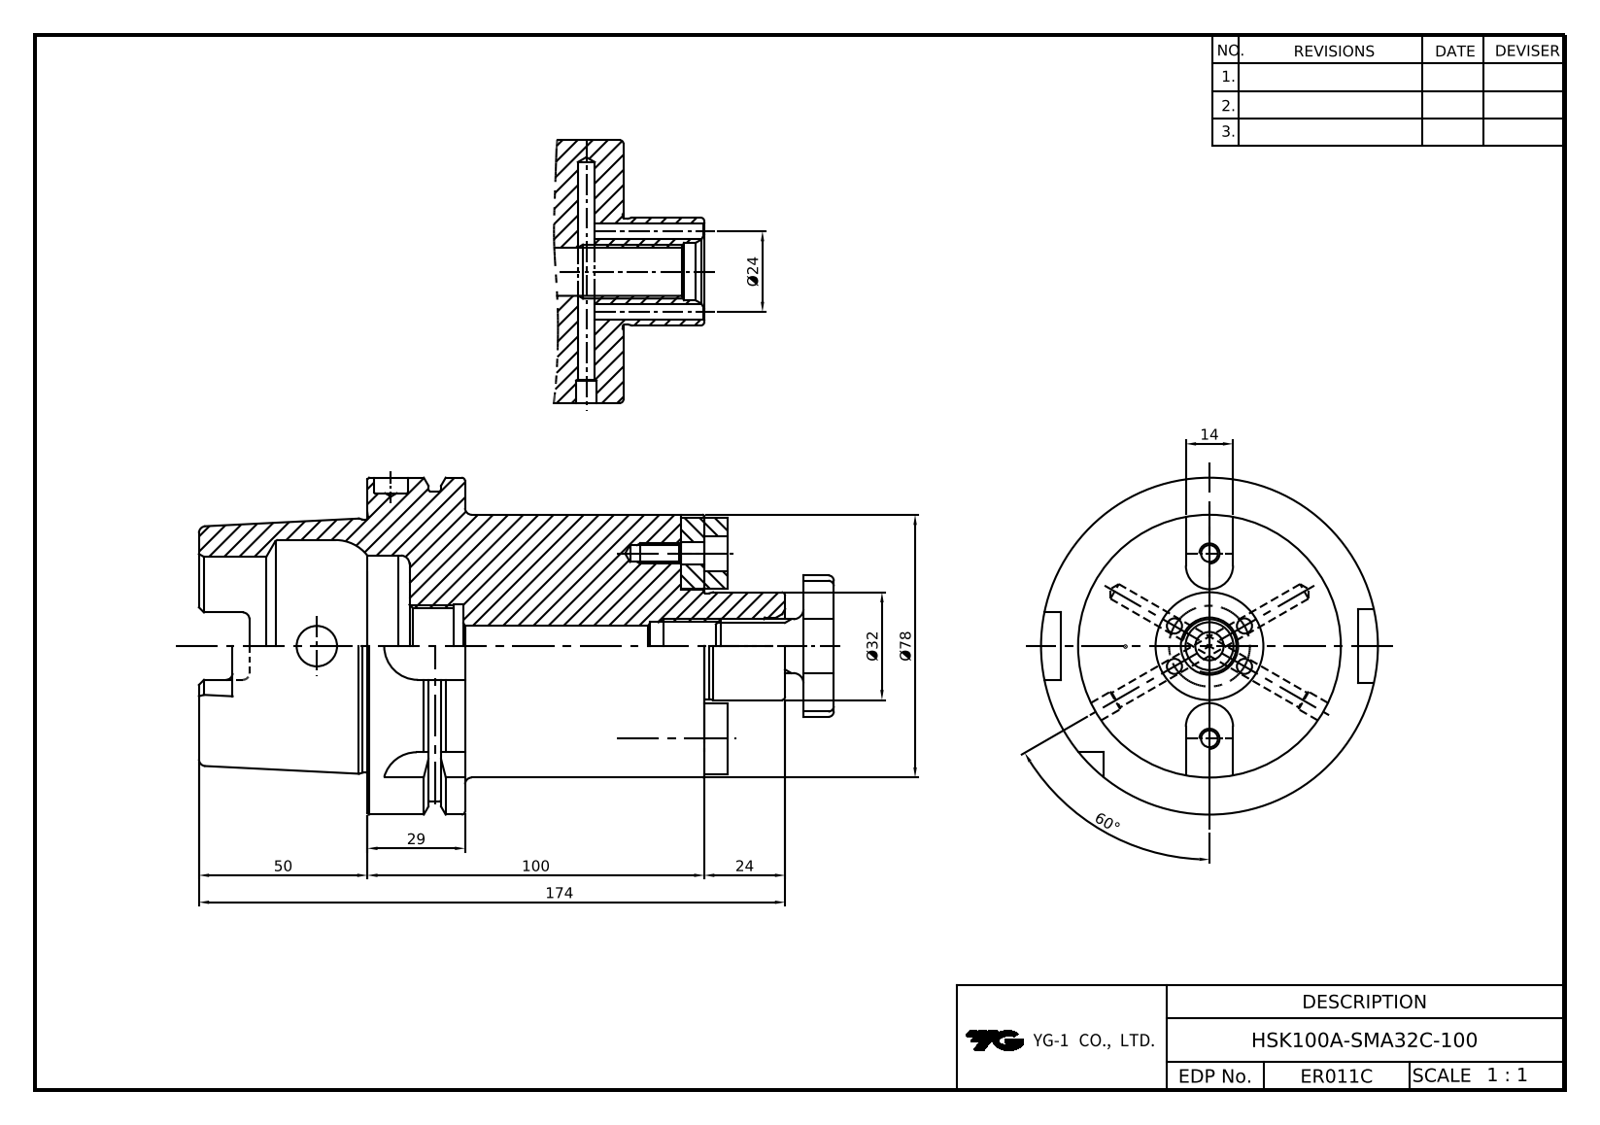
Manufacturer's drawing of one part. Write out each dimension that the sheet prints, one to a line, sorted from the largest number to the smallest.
174
100
Ø78
60°
50
Ø32
29
24
Ø24
14
